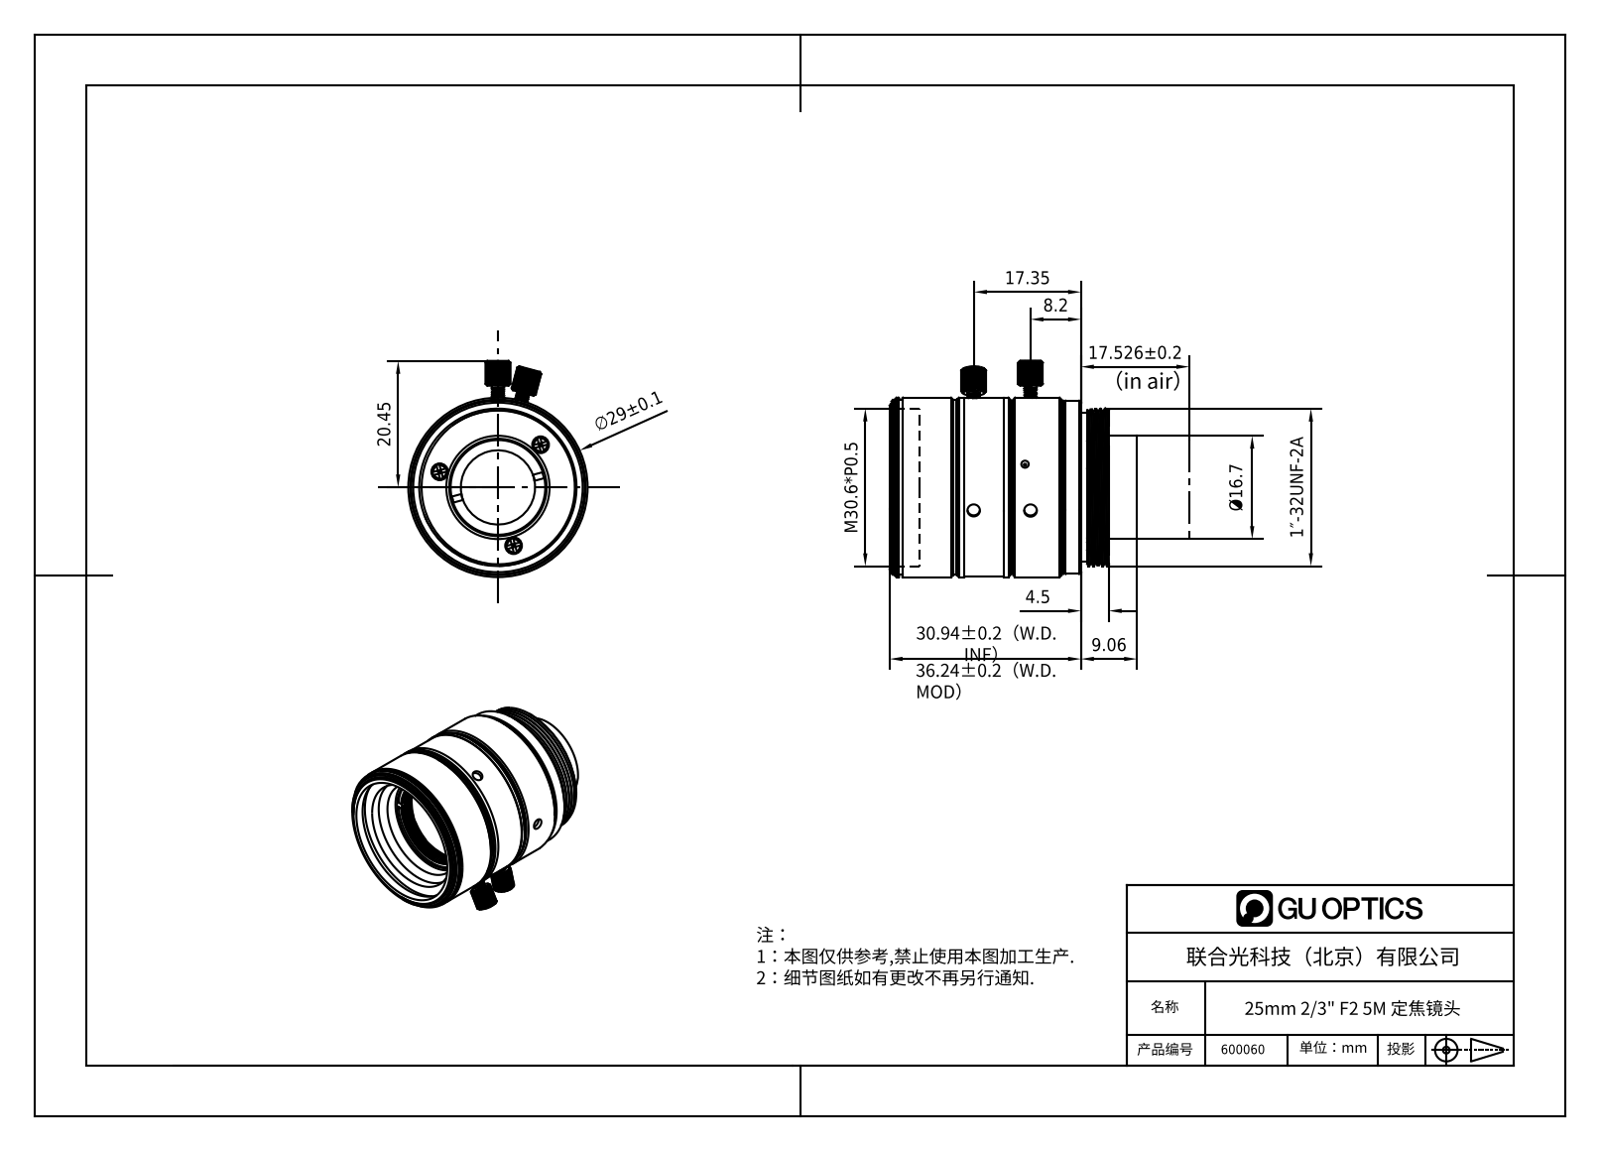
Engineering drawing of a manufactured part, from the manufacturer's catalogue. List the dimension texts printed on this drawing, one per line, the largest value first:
30.94±0.2（W.D. INF）
M30.6*P0.5
∅29±0.1
20.45
17.526±0.2
17.35
Ø16.7
9.06
8.2
4.5
1″-32UNF-2A
